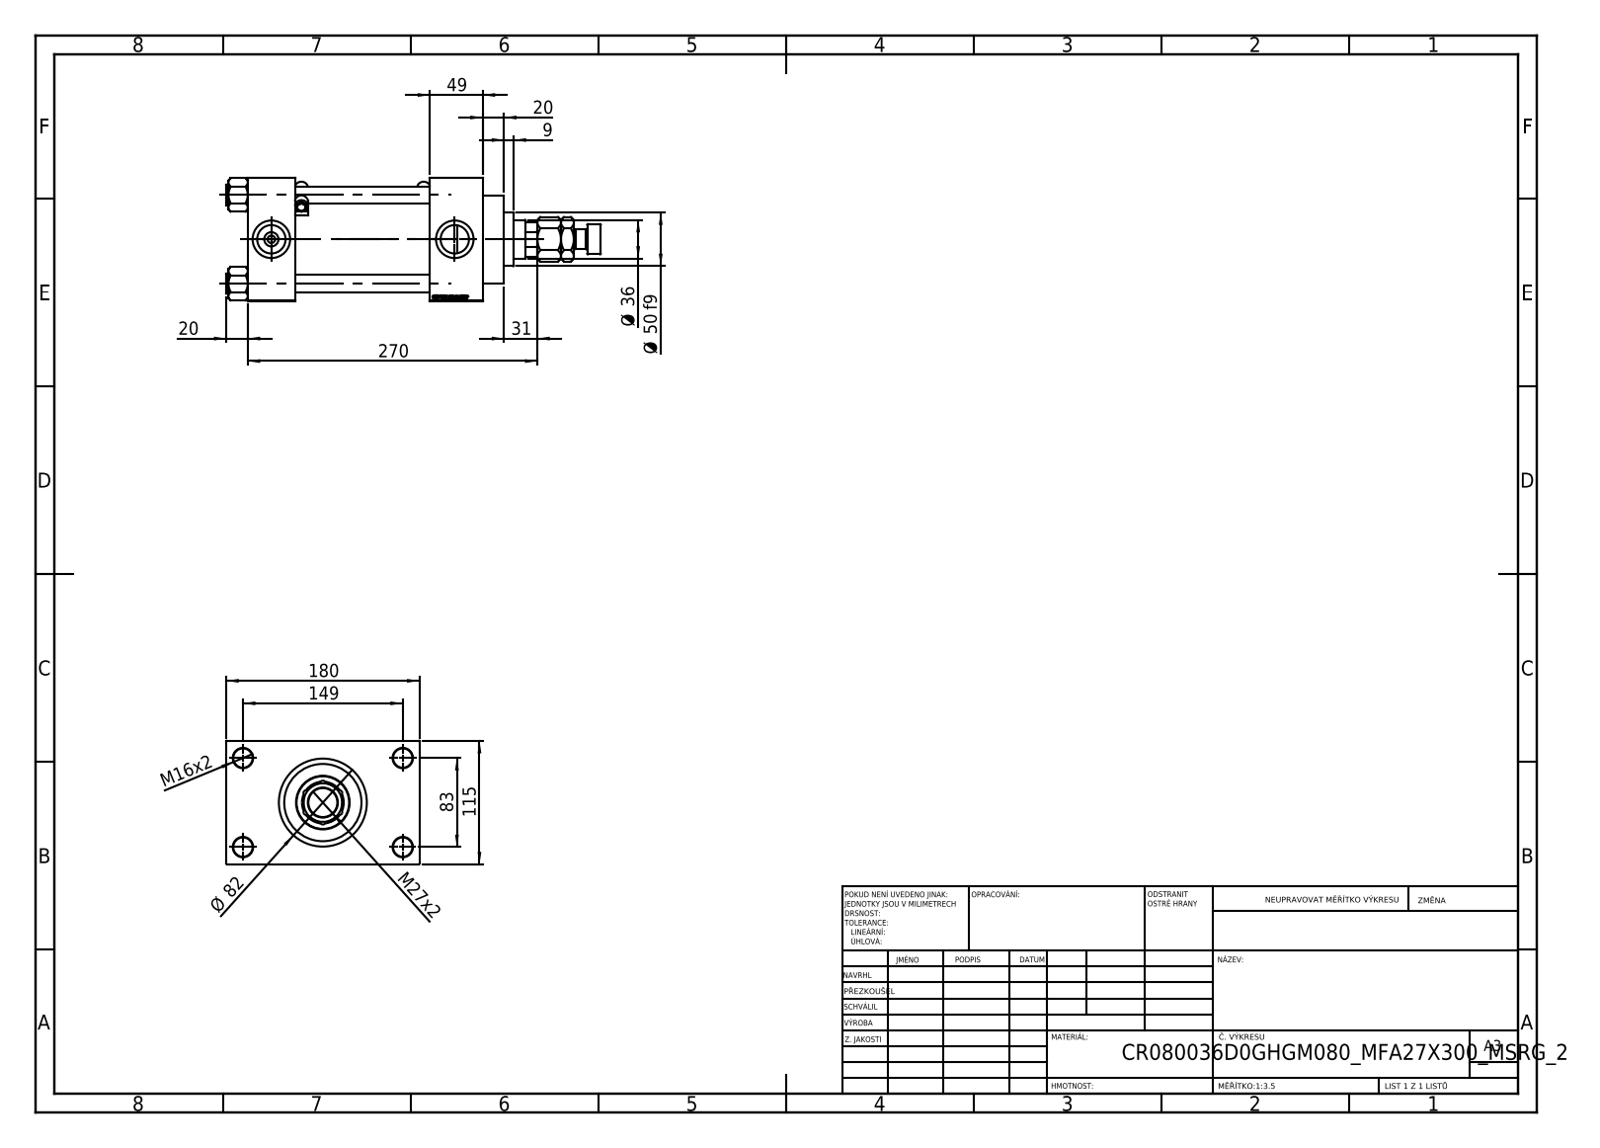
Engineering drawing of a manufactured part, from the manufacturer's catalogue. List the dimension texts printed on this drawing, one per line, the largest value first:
270
180
149
115
83
Ø 82
Ø 50 f9
49
Ø 36
31
M27x2
20
20
M16x2
9
